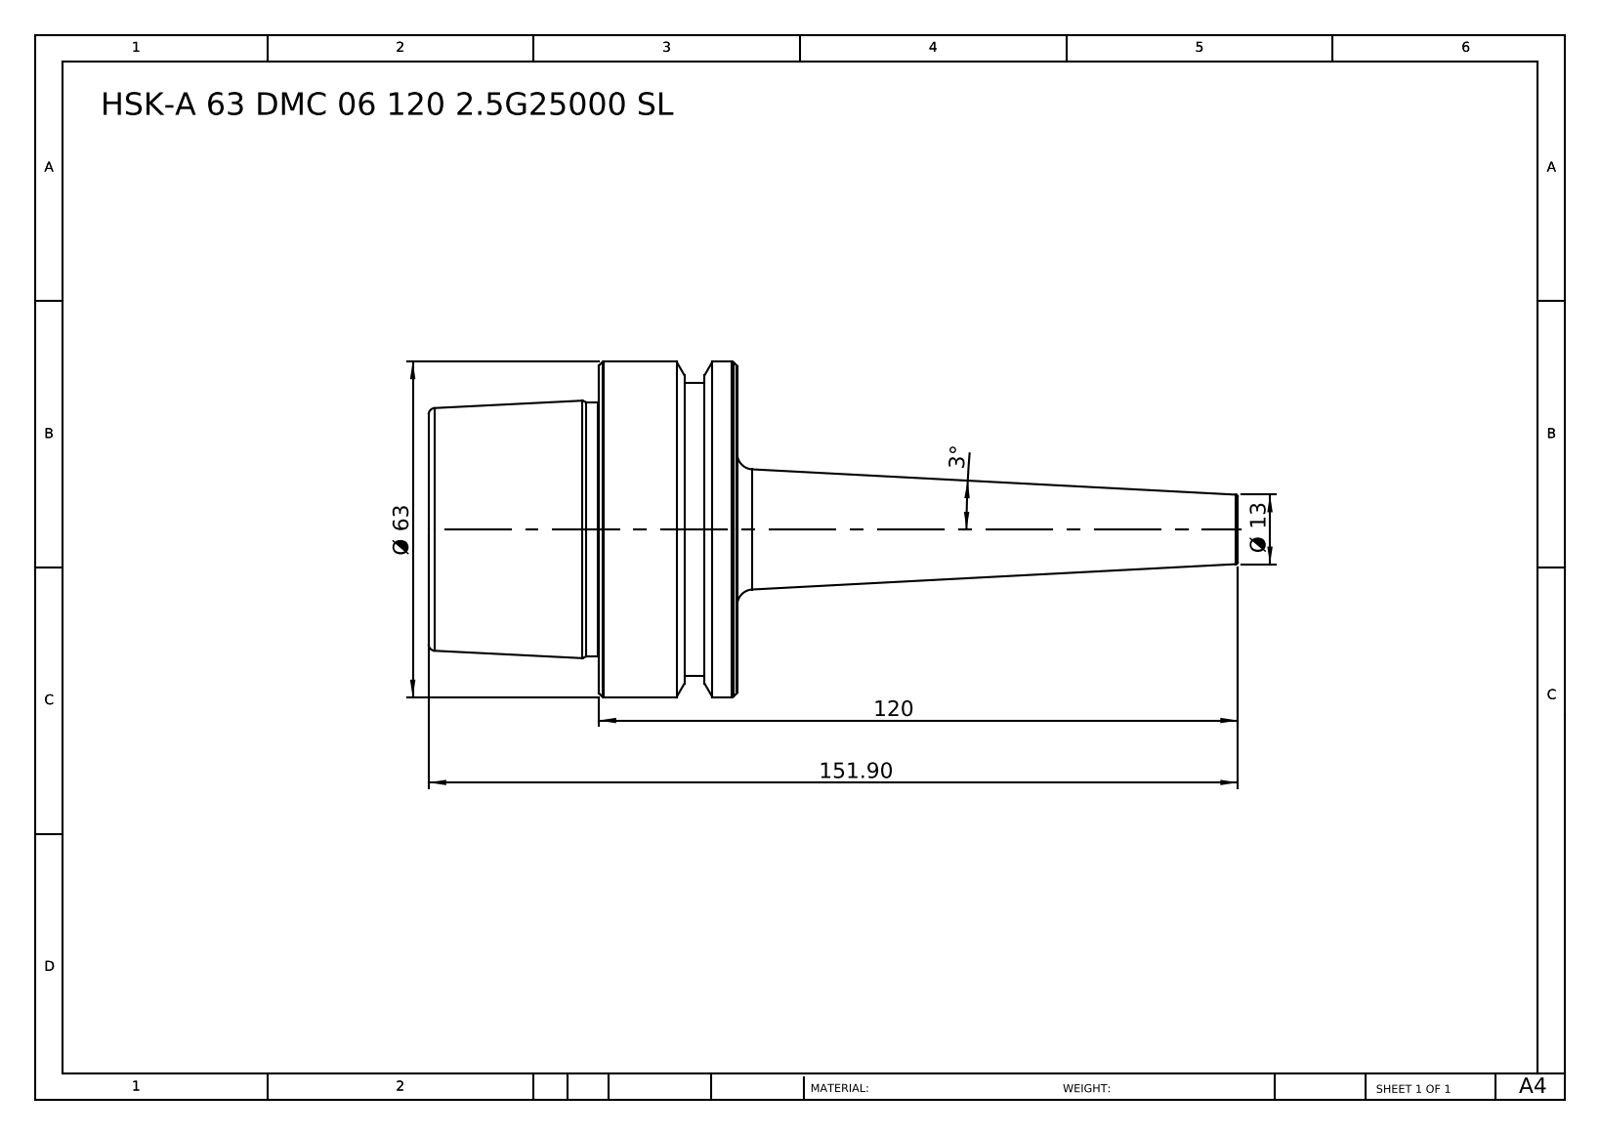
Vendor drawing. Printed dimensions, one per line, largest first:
151.90
120
Ø 63
Ø 13
3°
